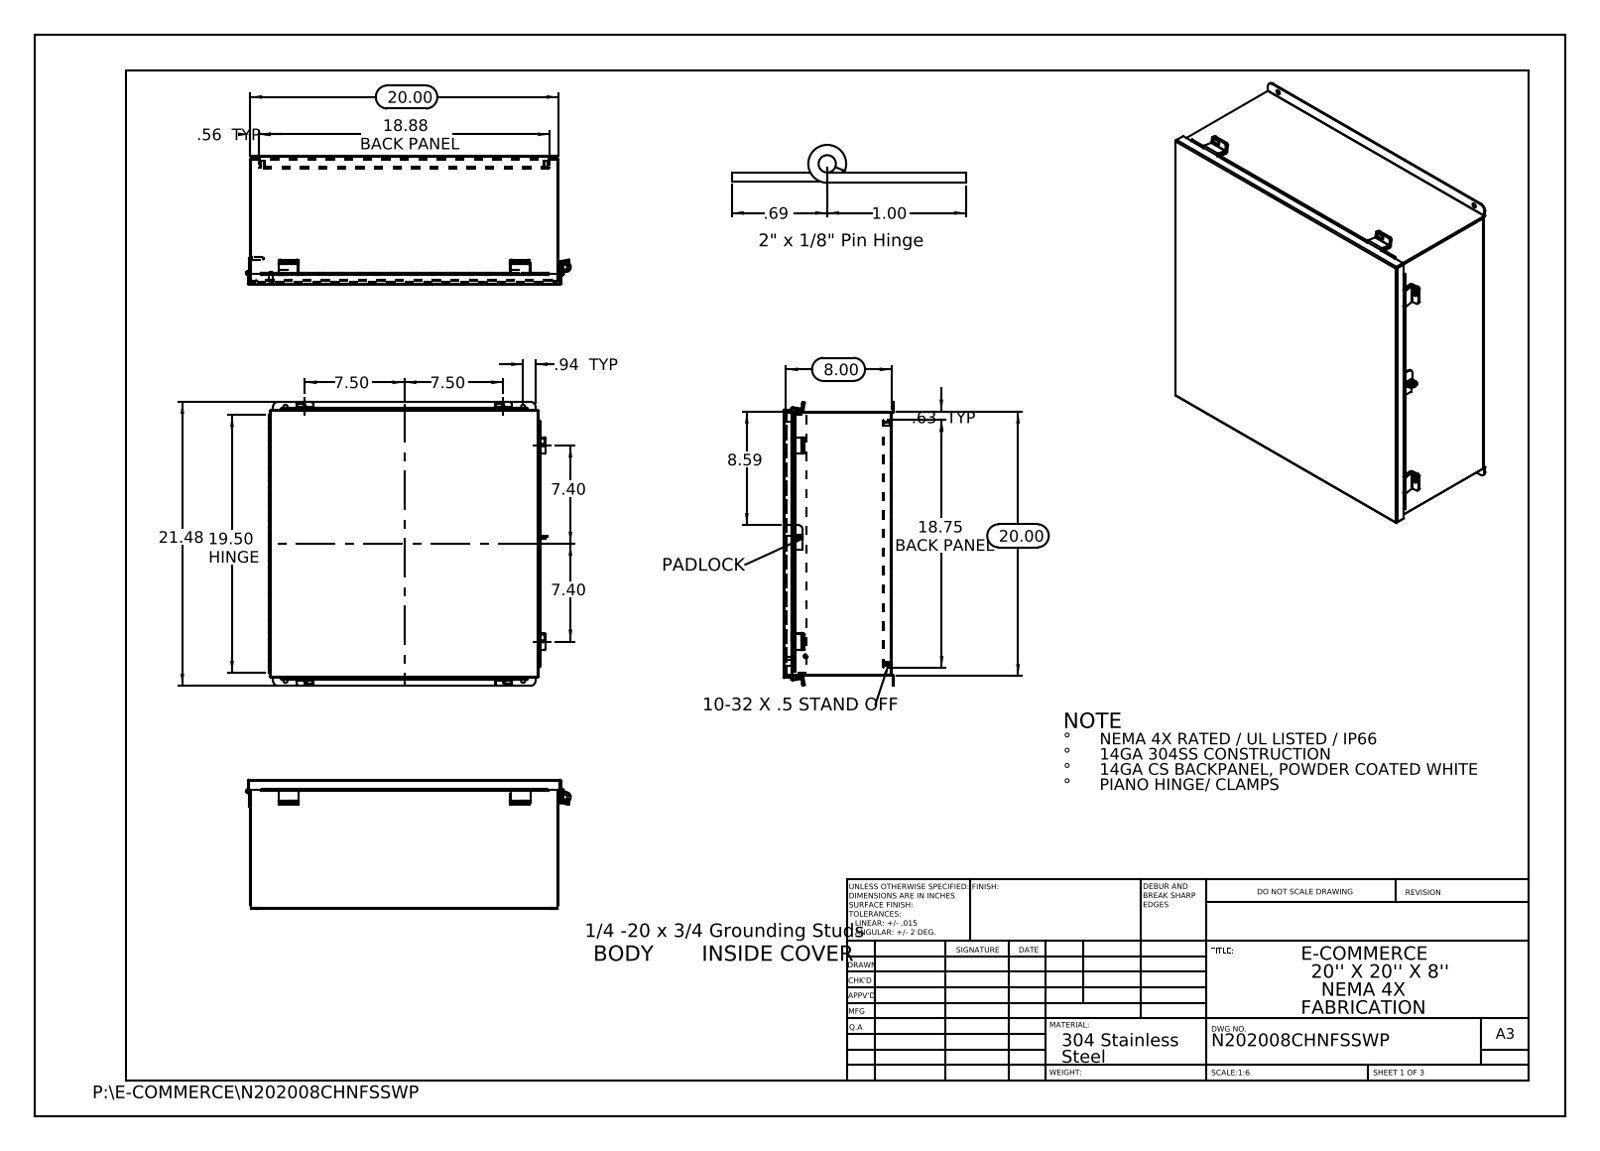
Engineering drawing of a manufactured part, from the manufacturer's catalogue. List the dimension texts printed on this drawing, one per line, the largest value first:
21.48
20.00
20.00
19.50 HINGE
18.88 BACK PANEL
18.75 BACK PANEL
8.59
8.00
7.50
7.50
7.40
7.40
1.00
.94 TYP
.69
.63 TYP
.56 TYP
